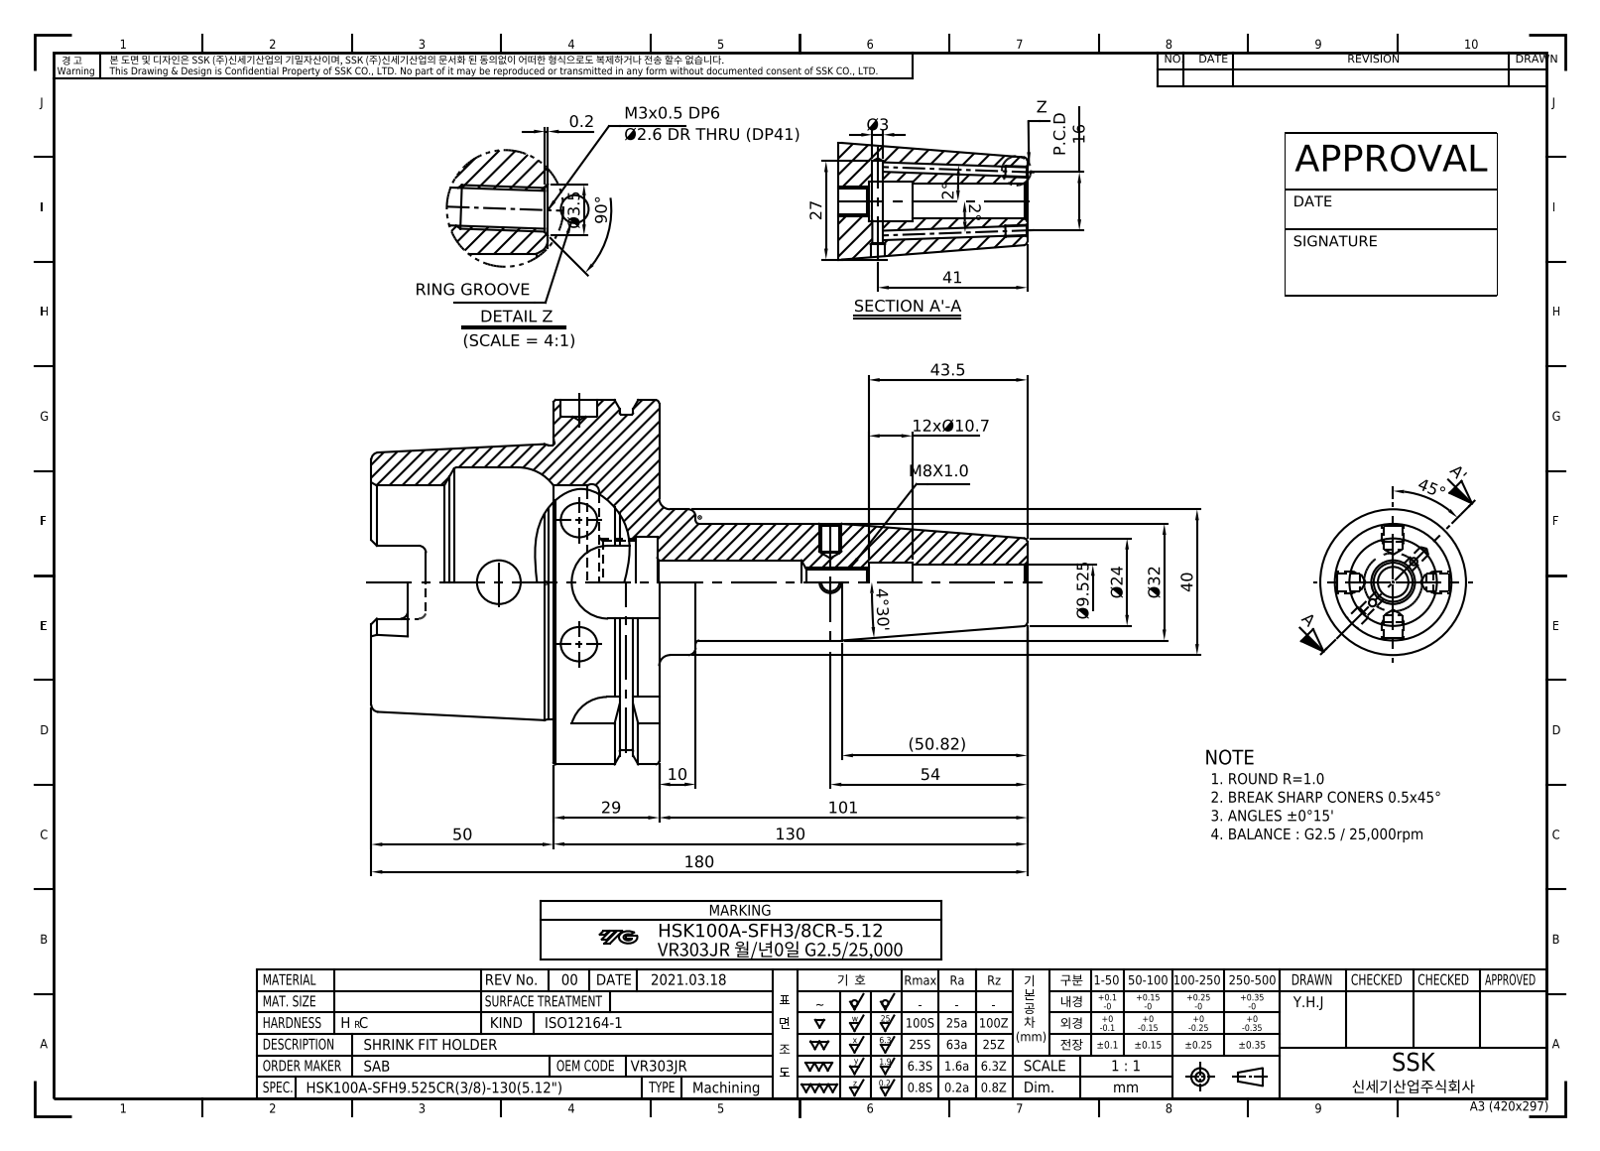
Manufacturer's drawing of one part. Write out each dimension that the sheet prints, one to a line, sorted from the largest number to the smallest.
180
130
101
90°
54
(50.82)
50
45°
43.5
41
40
Ø32
29
27
Ø24
P.C.D 16
12xØ10.7
10
Ø9.525
4°30'
Ø3.5
Ø3
2°
2°
0.2
